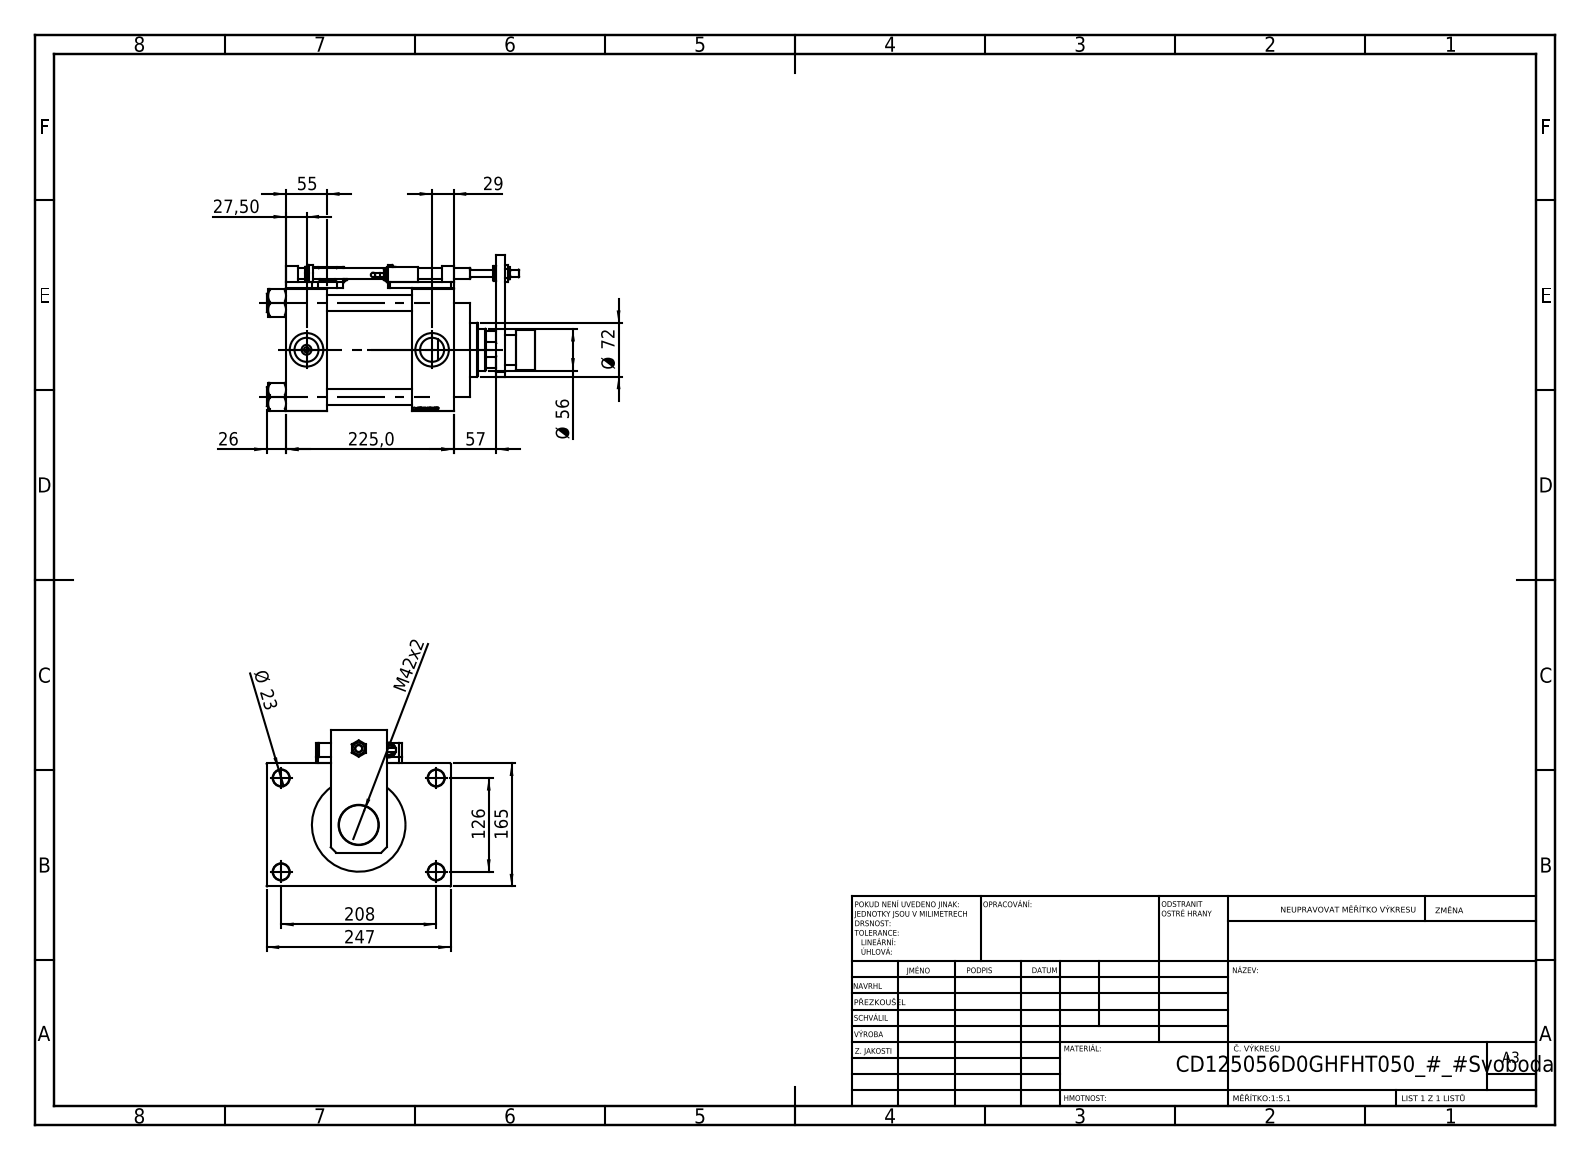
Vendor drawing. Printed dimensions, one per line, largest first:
247
225,0
208
165
126
Ø 72
57
Ø 56
55
M42x2
29
27,50
26
Ø 23
